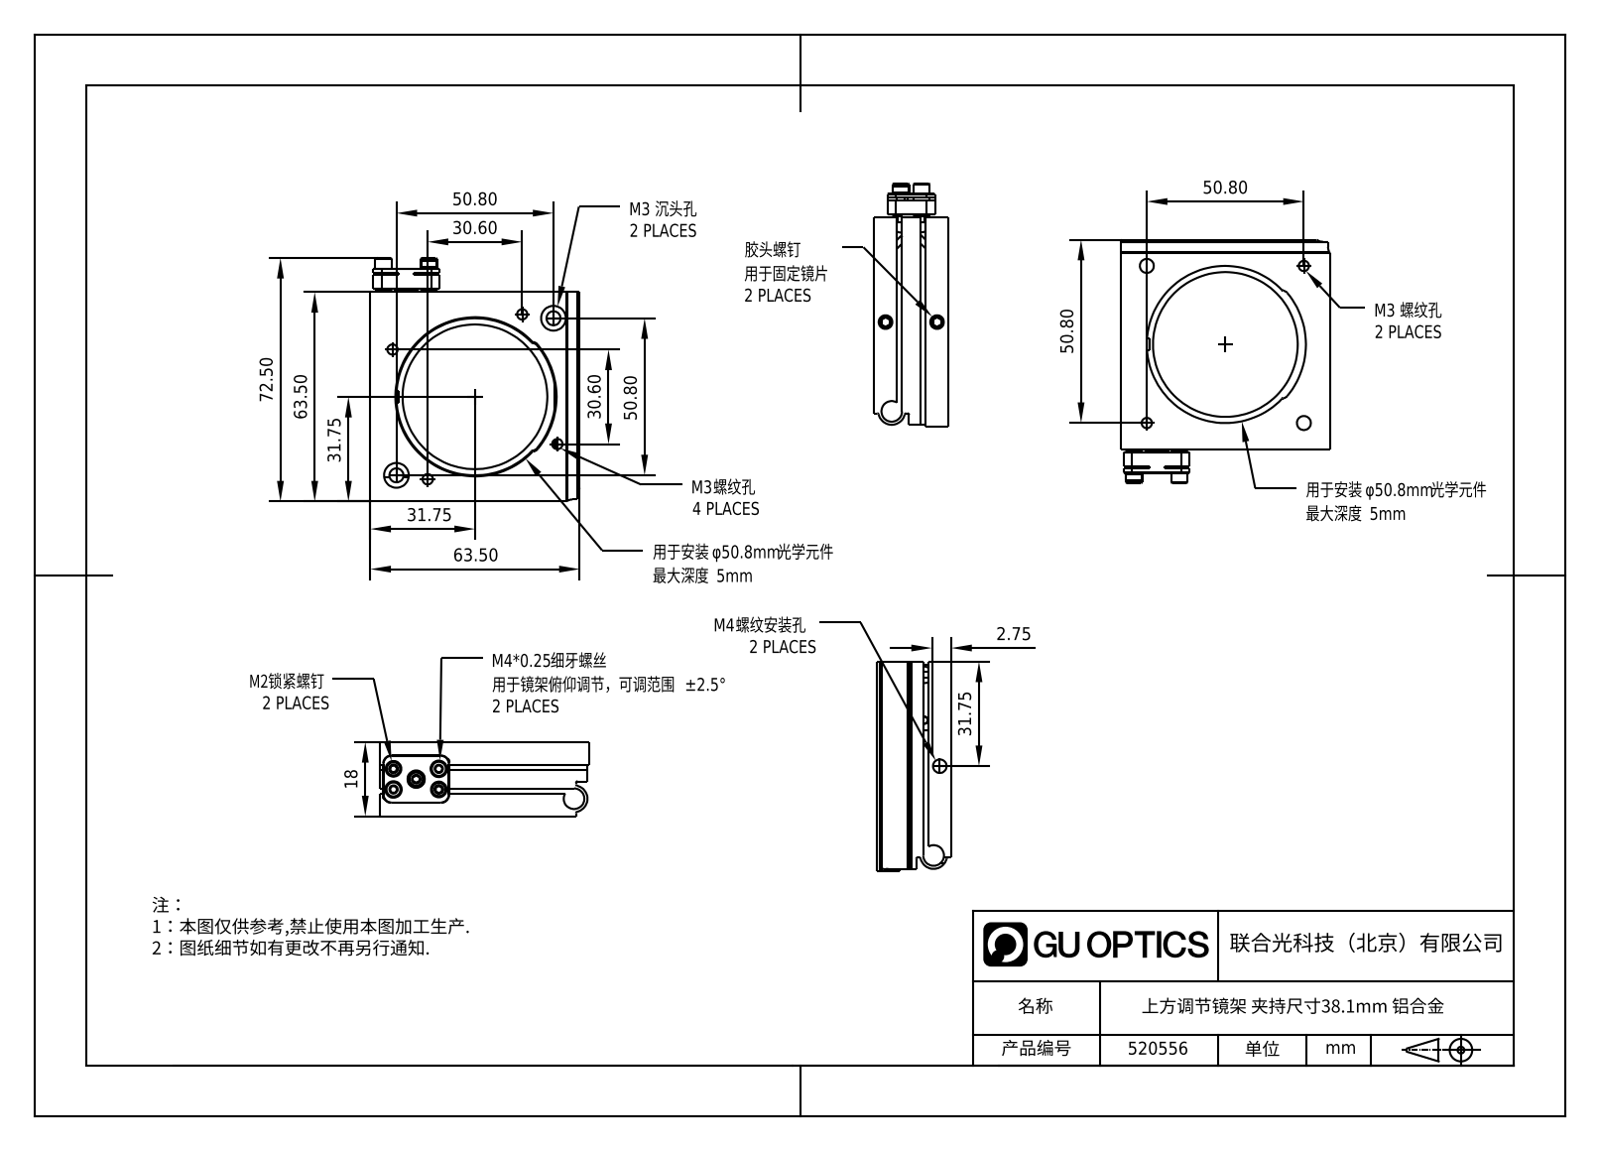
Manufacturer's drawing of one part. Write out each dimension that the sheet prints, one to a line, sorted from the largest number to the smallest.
72.50
63.50
63.50
50.80
50.80
50.80
50.80
31.75
31.75
31.75
30.60
30.60
18
2.75
